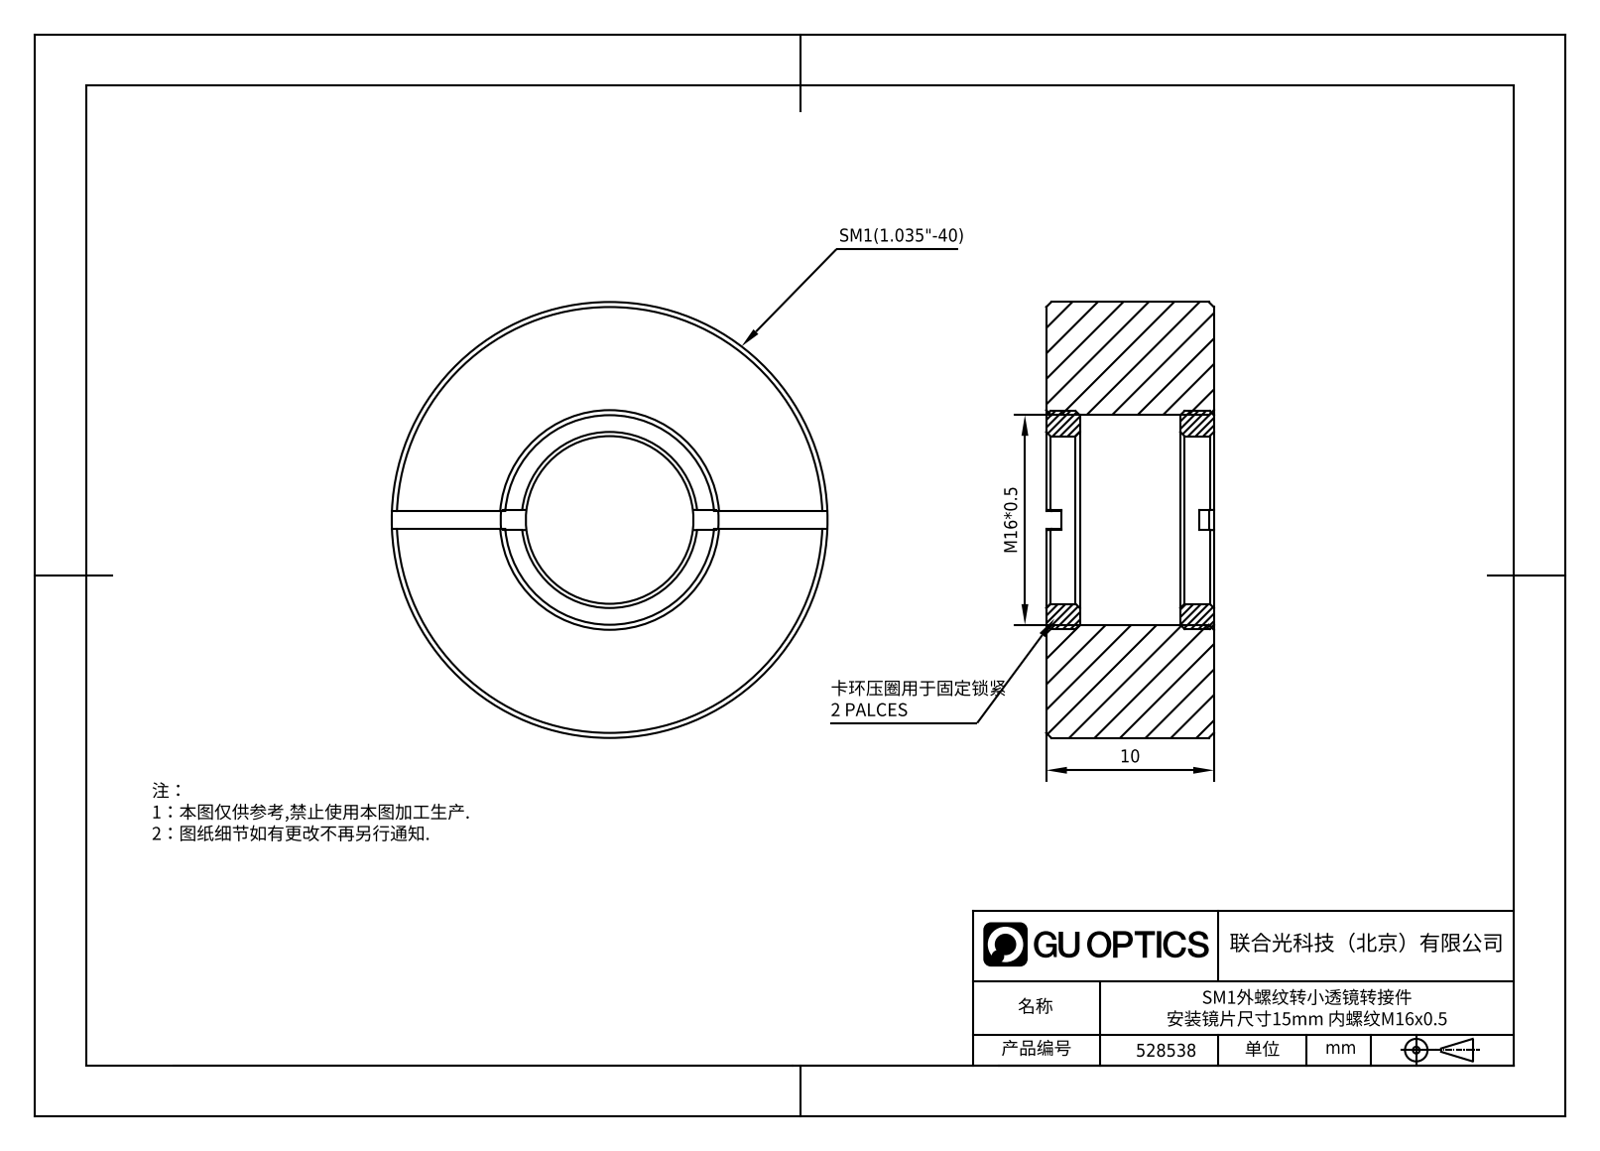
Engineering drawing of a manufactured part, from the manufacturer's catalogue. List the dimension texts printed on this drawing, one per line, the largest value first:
M16*0.5
10
